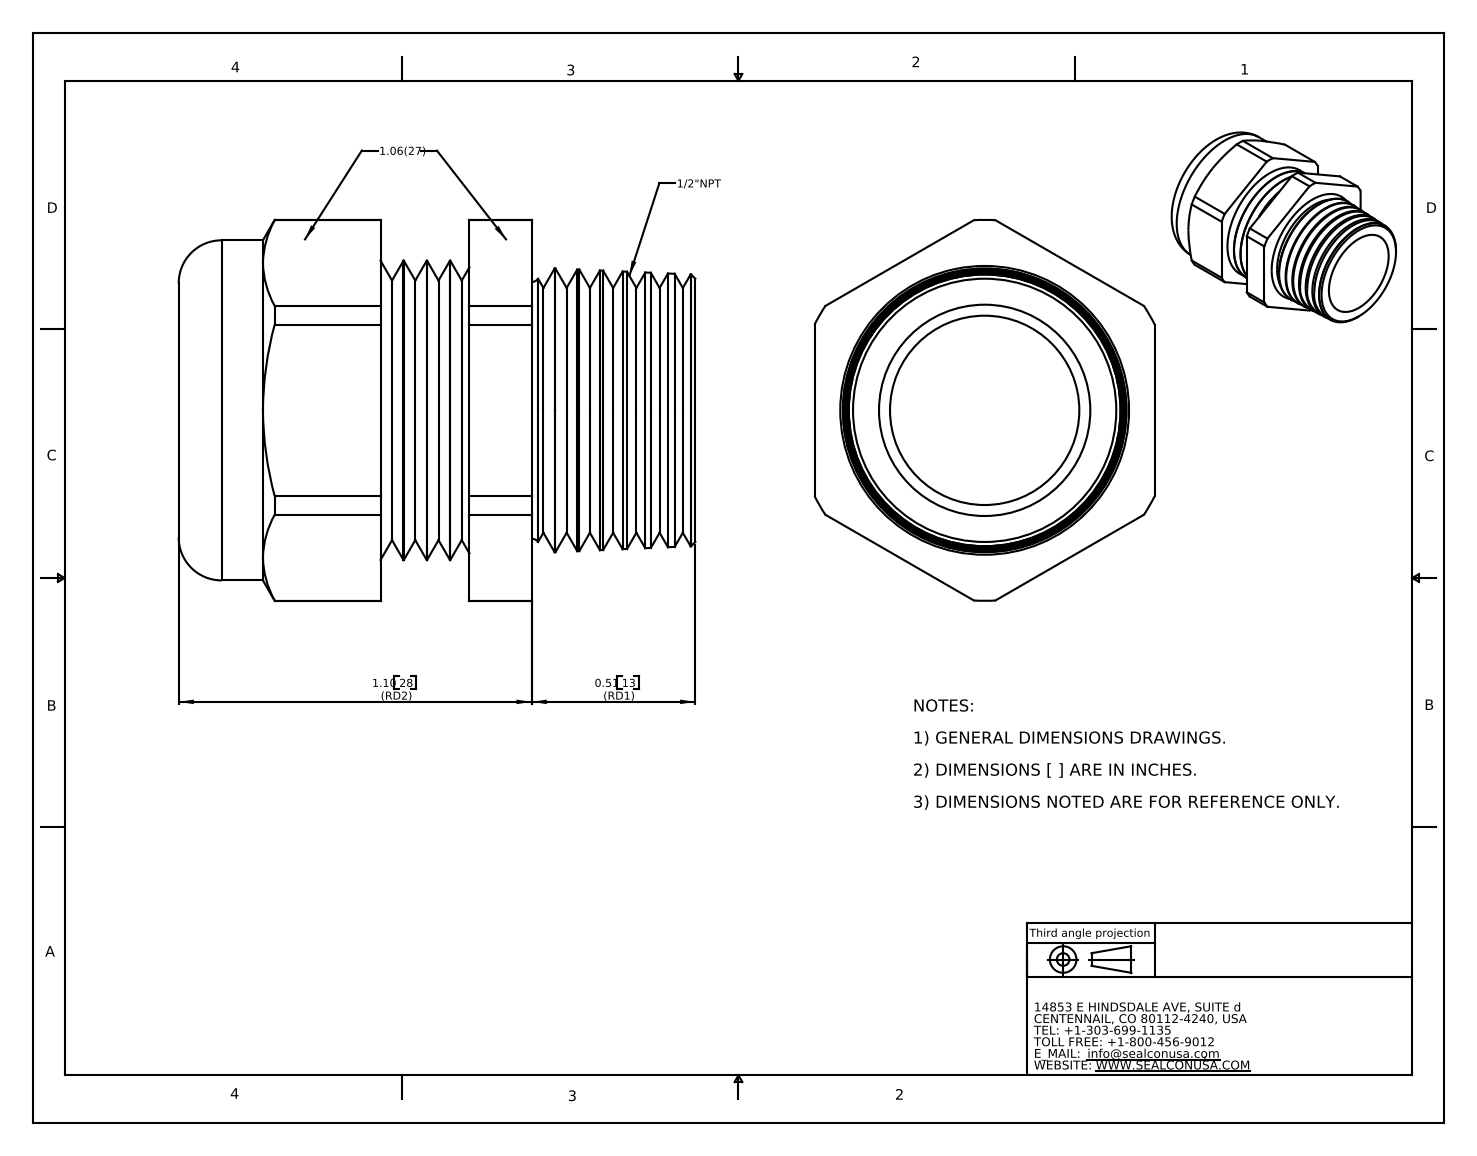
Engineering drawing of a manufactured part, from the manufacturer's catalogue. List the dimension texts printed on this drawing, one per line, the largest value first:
1.10 28 (RD2)
0.51 13 (RD1)
